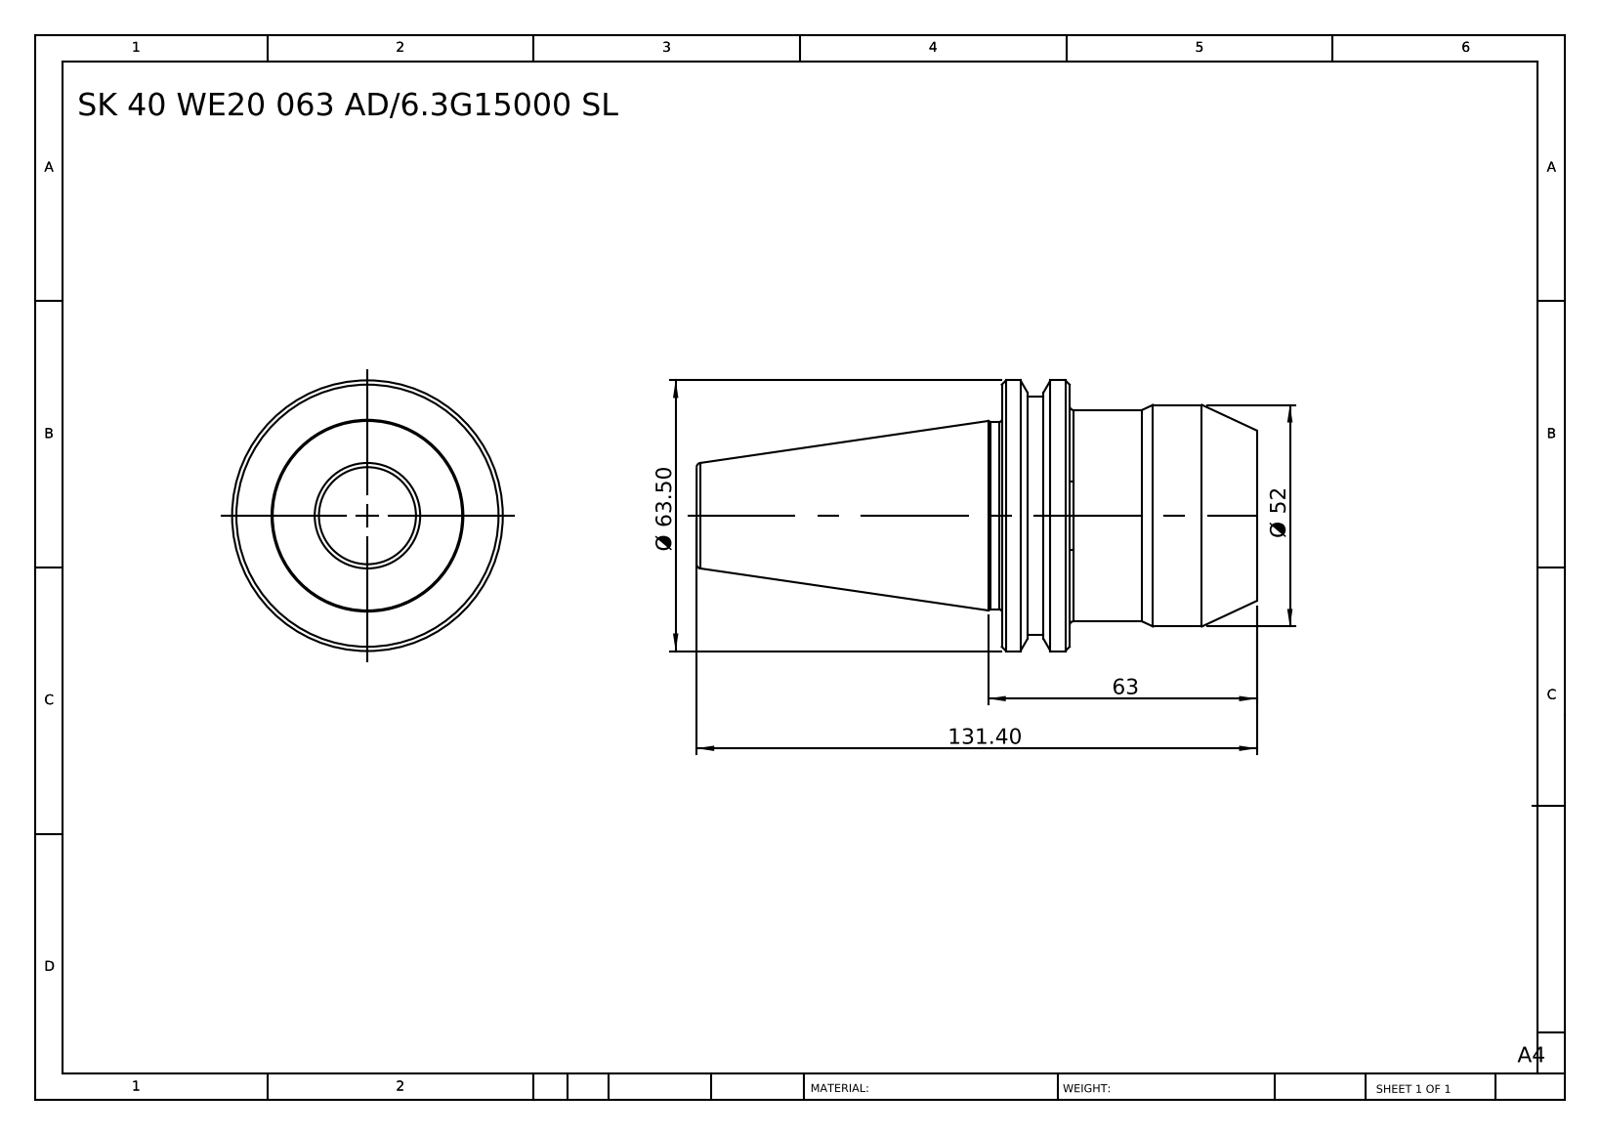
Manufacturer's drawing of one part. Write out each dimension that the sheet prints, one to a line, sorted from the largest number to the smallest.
131.40
Ø 63.50
63
Ø 52
